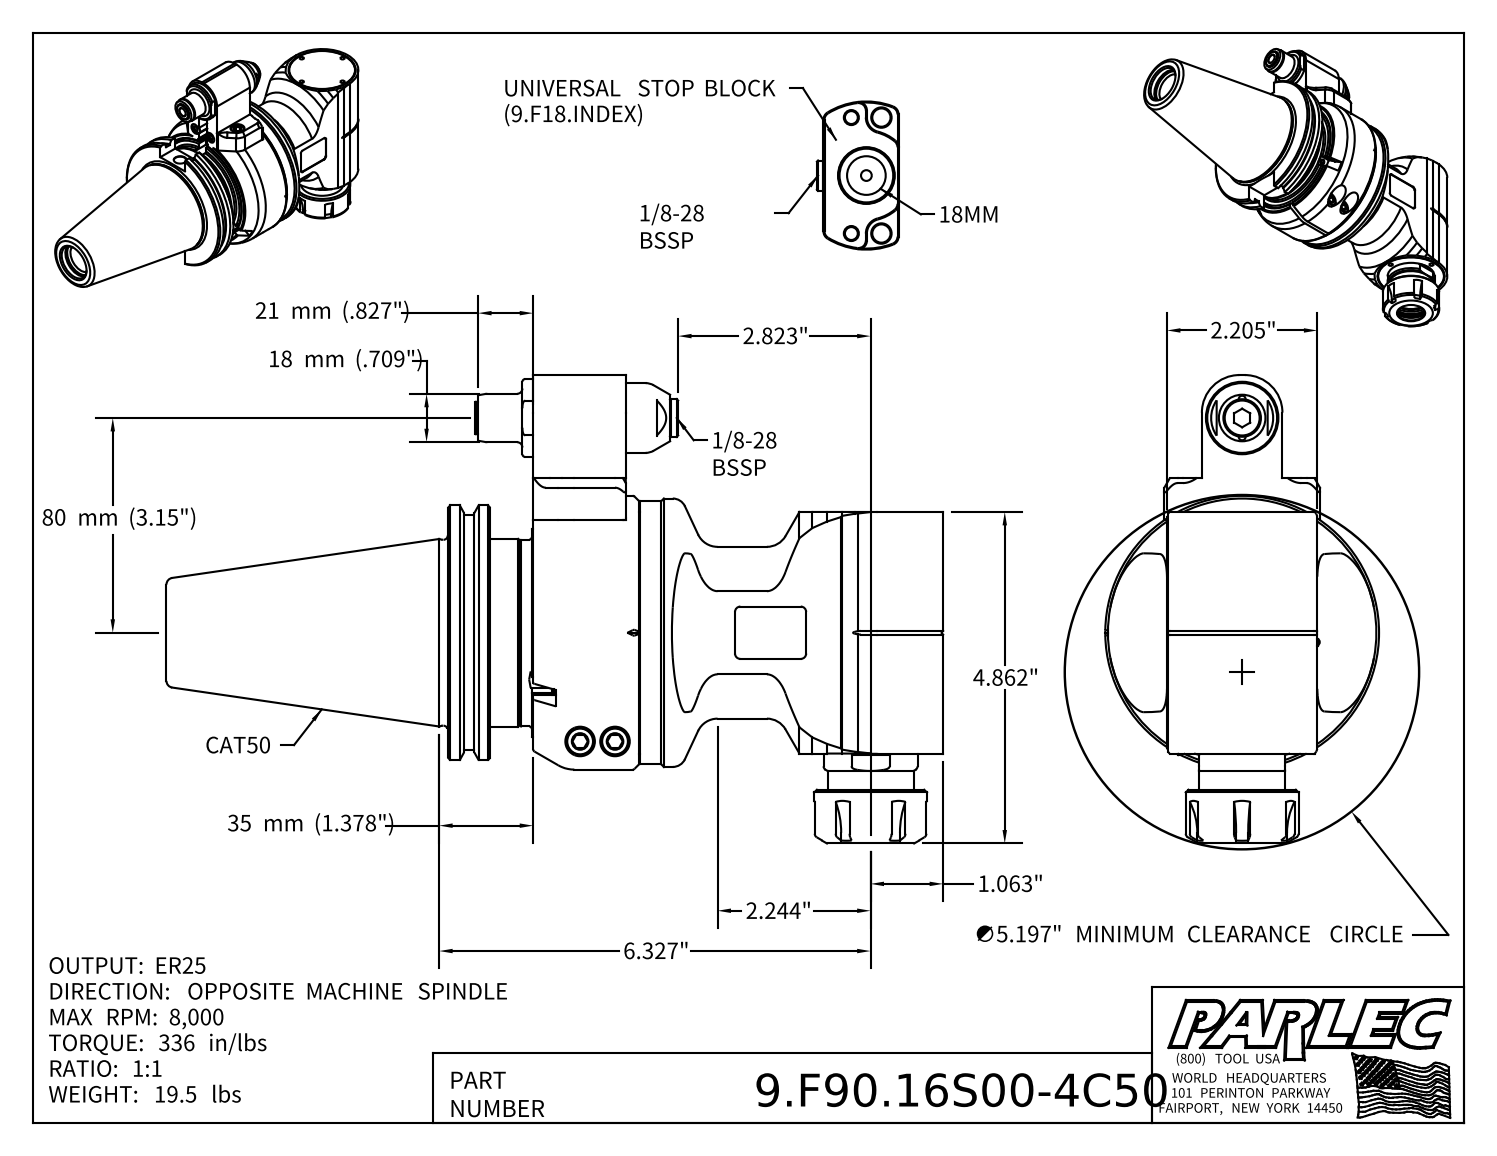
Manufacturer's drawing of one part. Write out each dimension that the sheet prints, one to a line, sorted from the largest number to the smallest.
80 mm (3.15")
35 mm (1.378")
21 mm (.827")
18 mm (.709")
6.327"
∅5.197" MINIMUM CLEARANCE CIRCLE
4.862"
2.823"
2.244"
2.205"
1.063"
